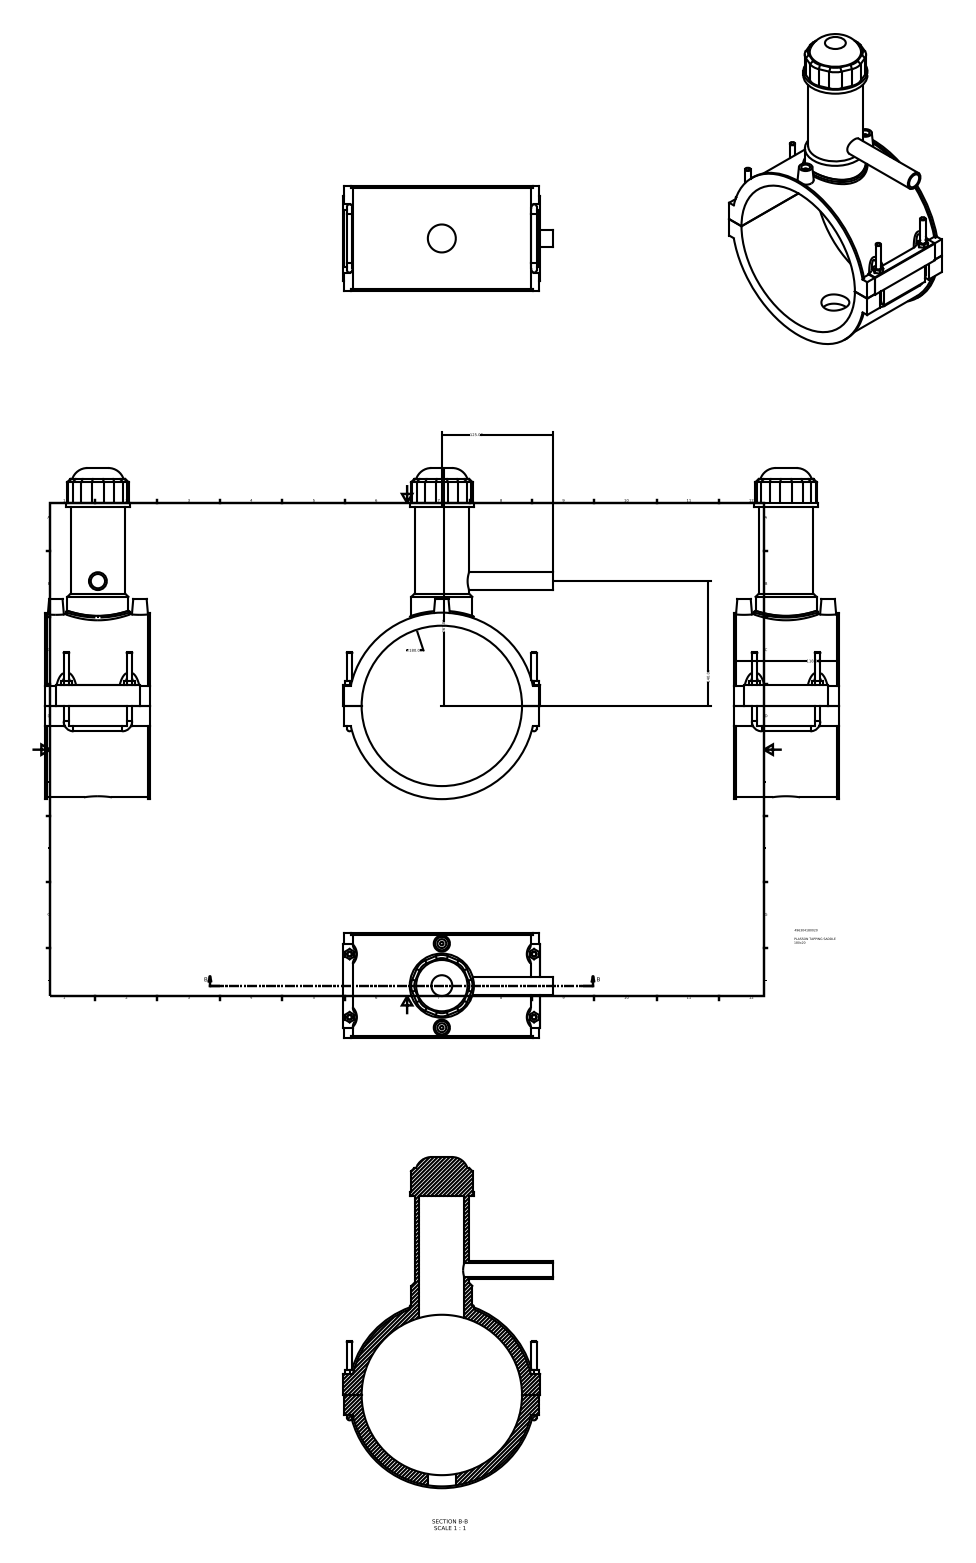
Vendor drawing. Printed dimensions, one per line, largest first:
267.00
∅180.00
140.00
125.00
118.00
